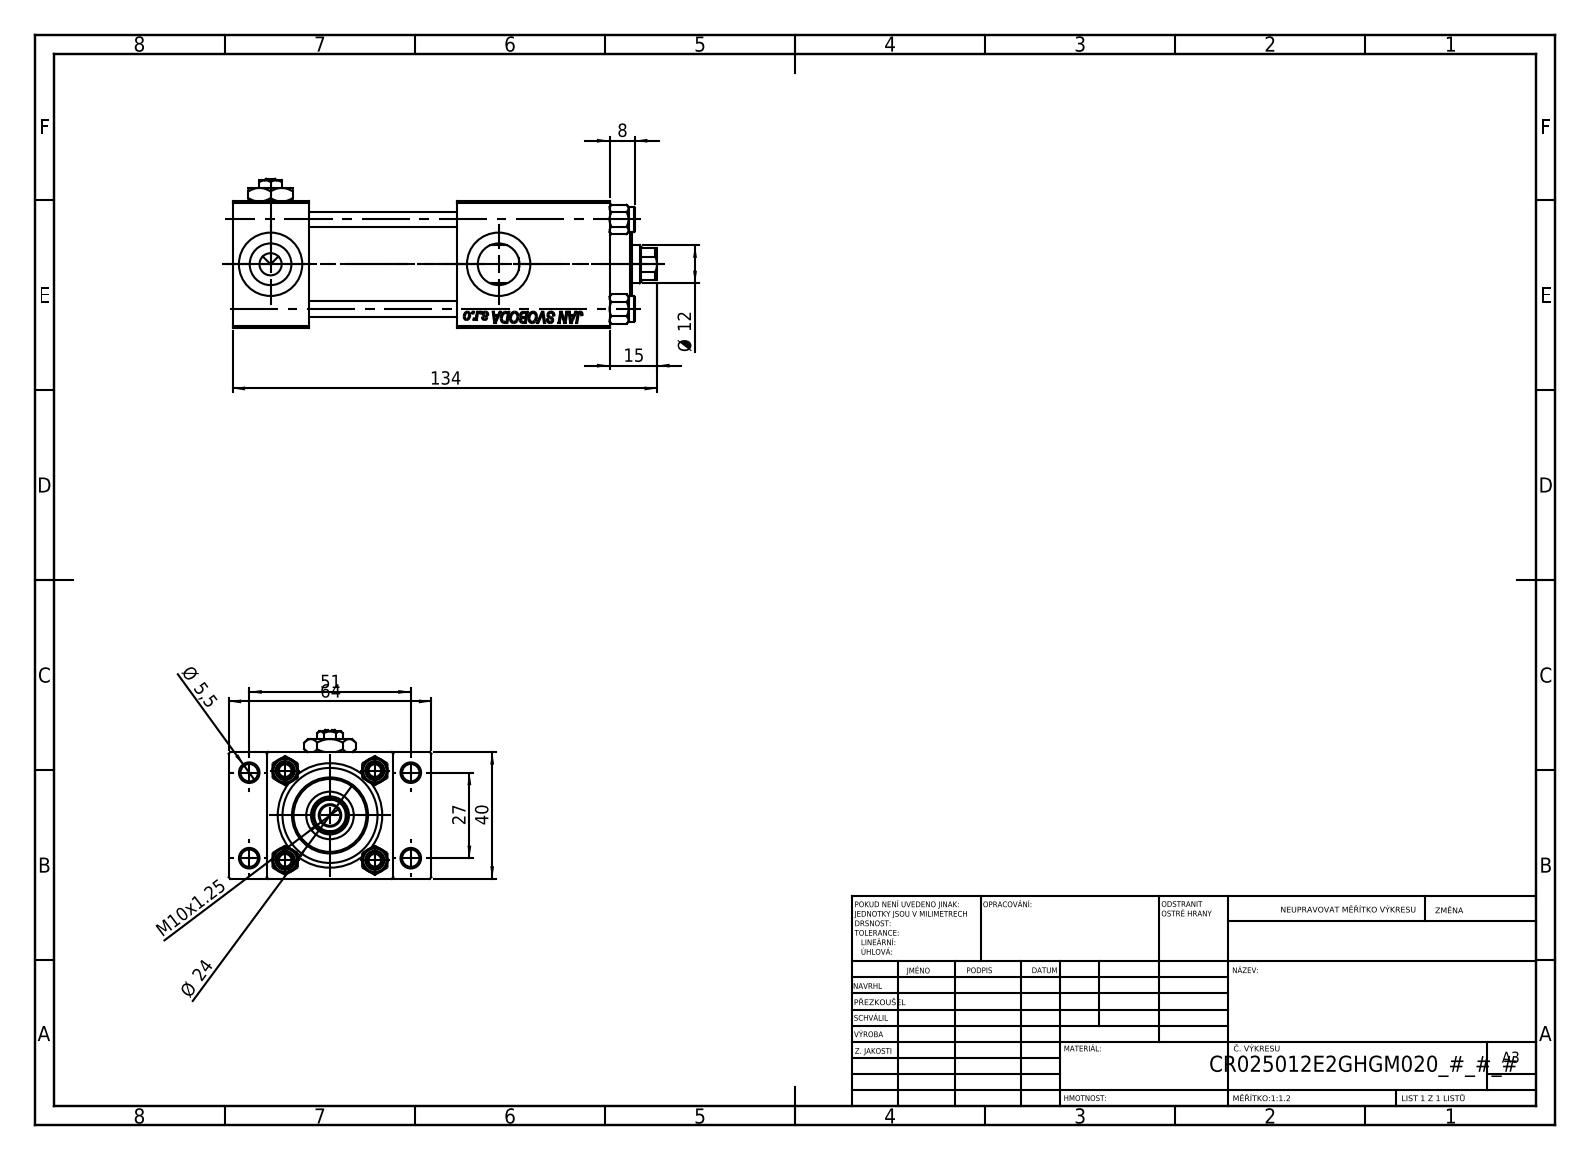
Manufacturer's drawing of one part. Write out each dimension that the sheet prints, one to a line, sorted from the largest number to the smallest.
134
64
51
40
27
Ø 24
15
Ø 12
M10x1.25
8
Ø 5,5
